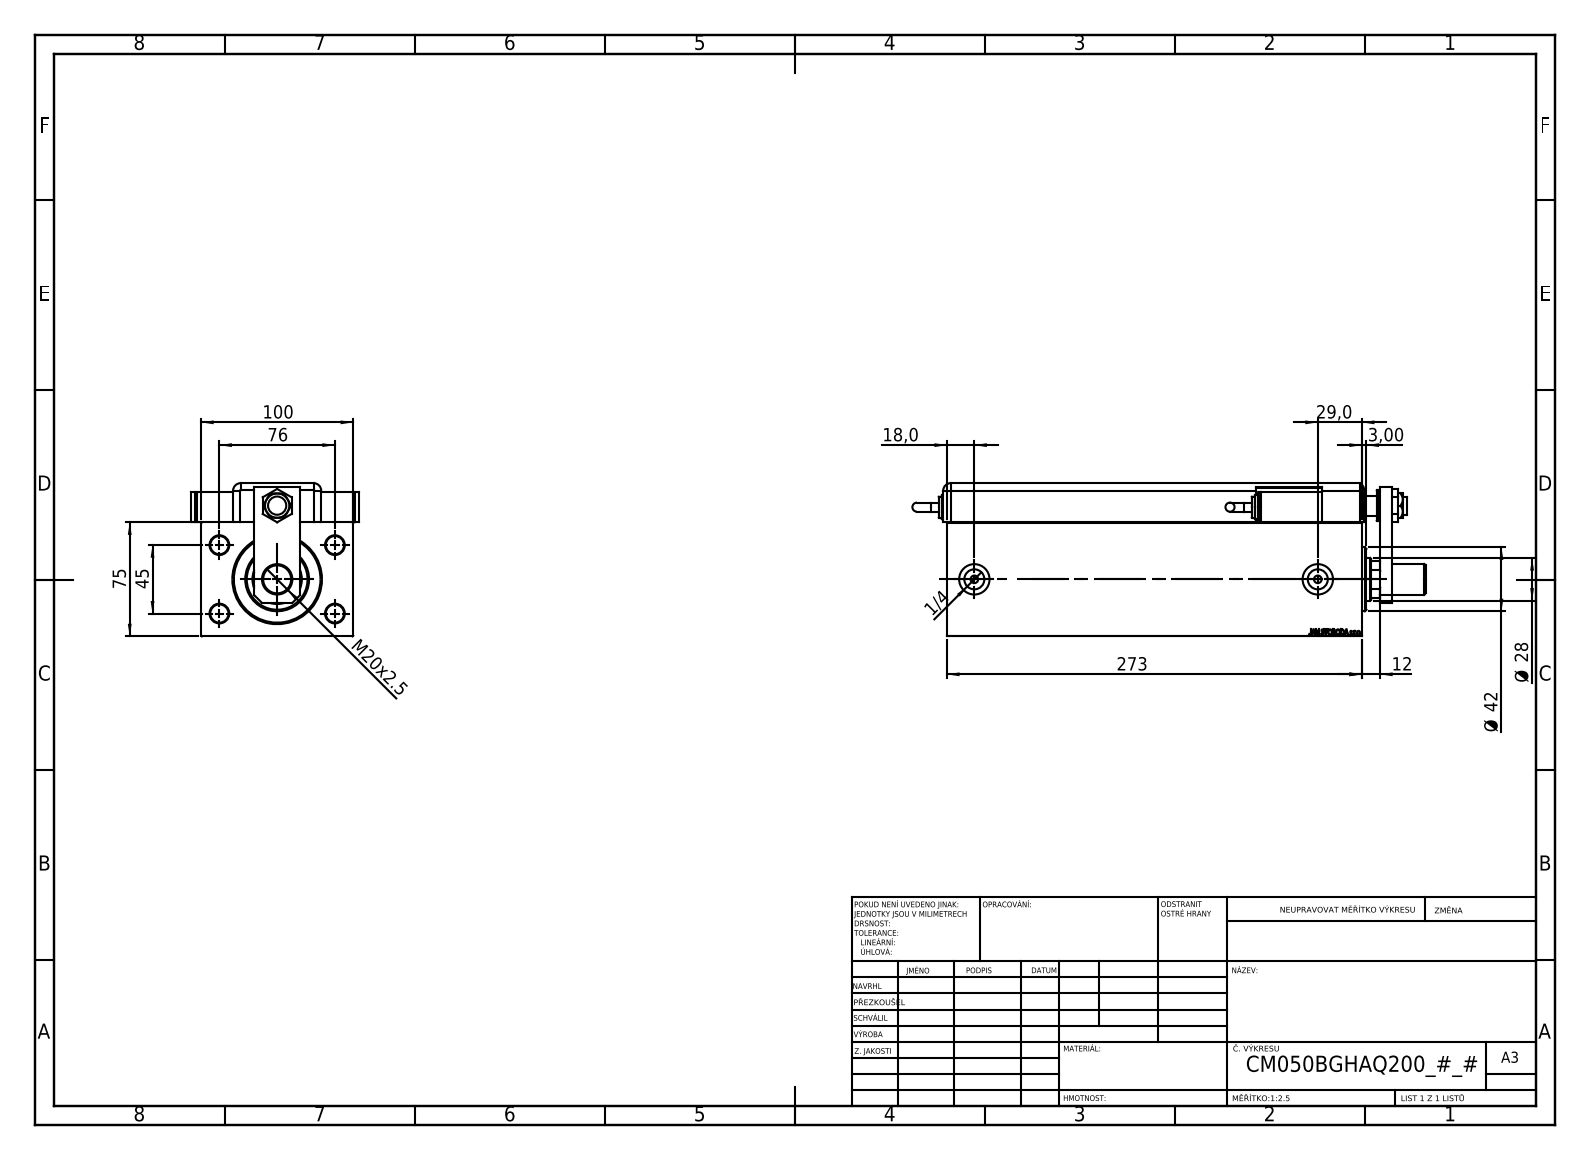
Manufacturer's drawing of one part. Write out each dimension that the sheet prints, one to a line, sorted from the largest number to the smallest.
273
100
76
75
45
Ø 42
29,0
Ø 28
M20x2.5
18,0
12
3,00
1/4
